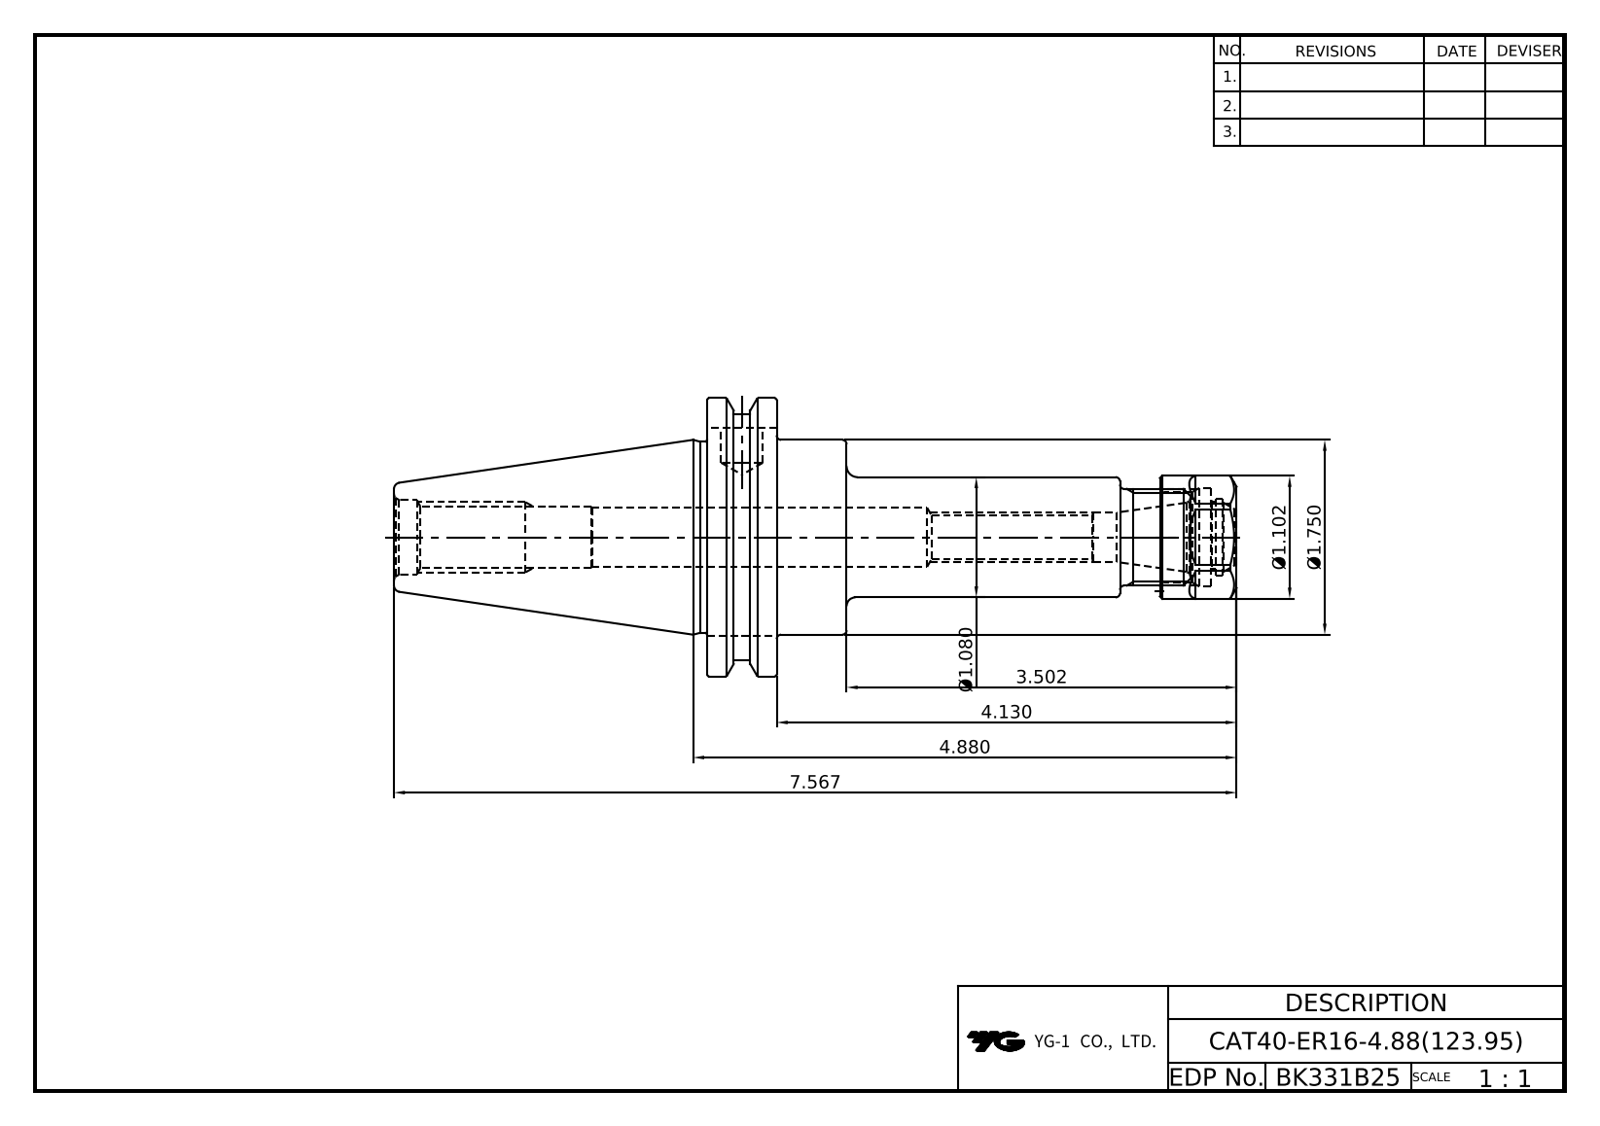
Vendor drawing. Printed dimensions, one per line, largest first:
7.567
4.880
4.130
3.502
Ø1.750
Ø1.102
Ø1.080
